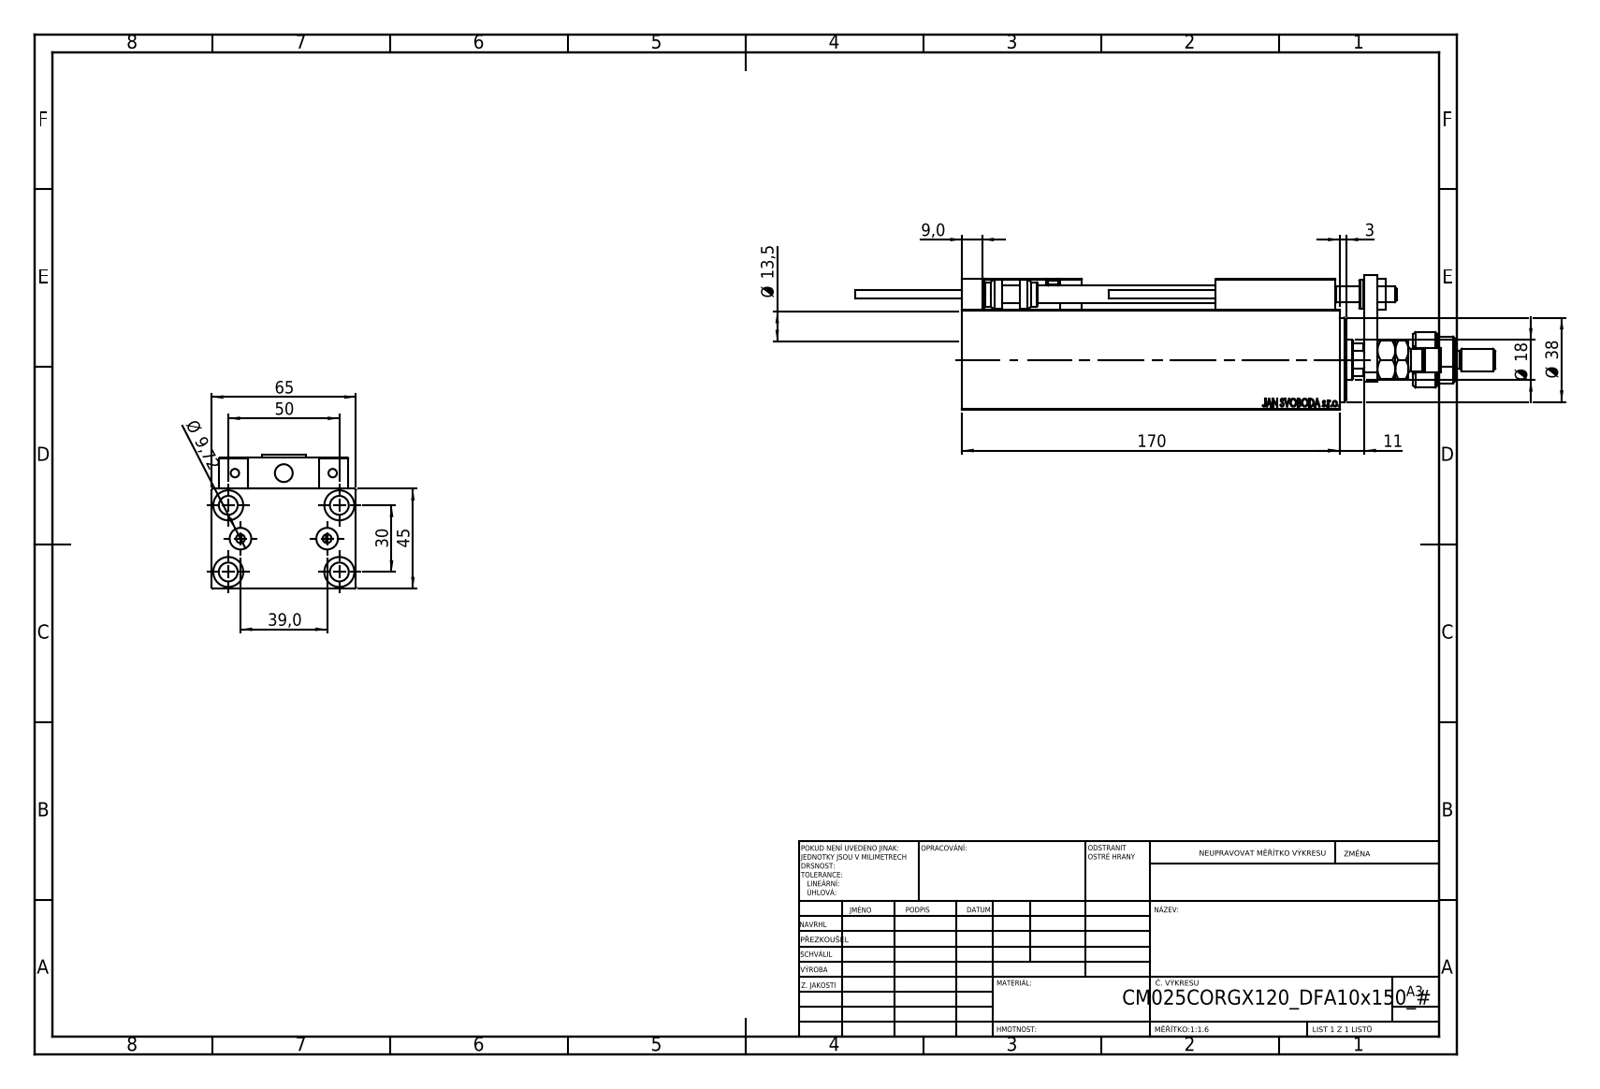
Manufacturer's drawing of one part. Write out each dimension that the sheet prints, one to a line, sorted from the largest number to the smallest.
170
65
50
45
39,0
Ø 38
30
Ø 18
Ø 13,5
11
Ø 9,72
9,0
3
